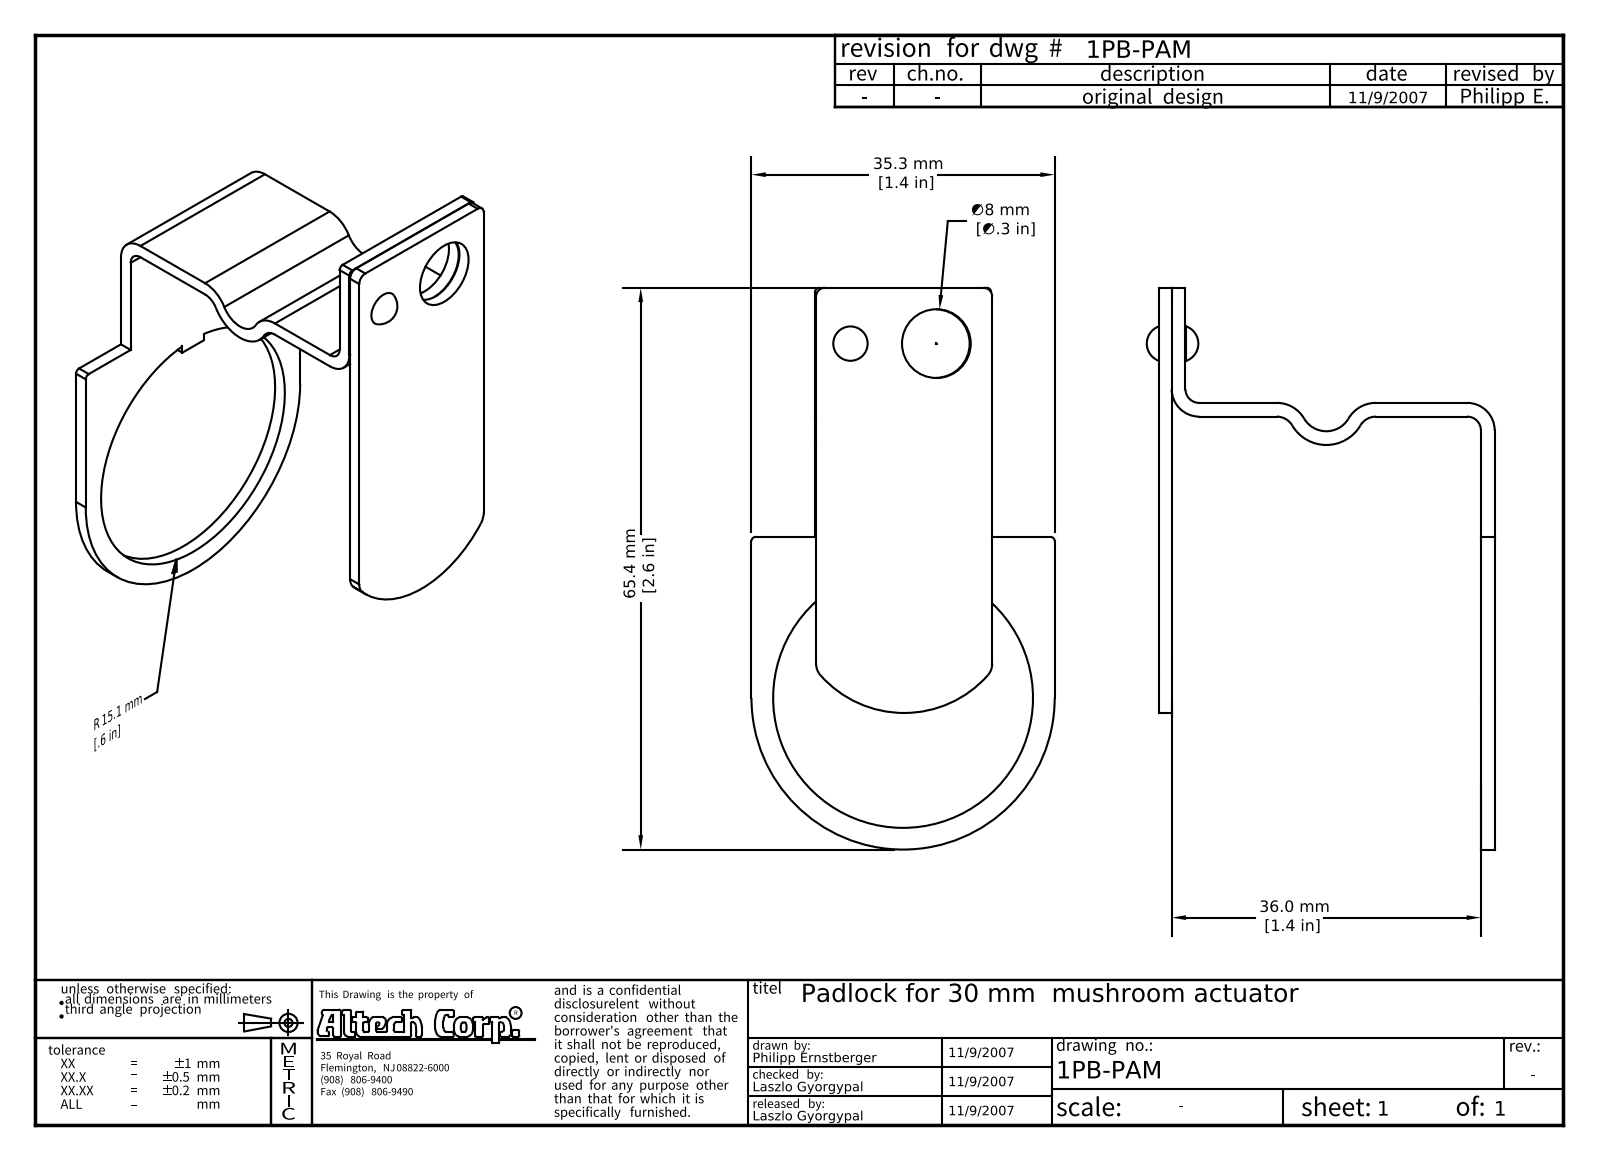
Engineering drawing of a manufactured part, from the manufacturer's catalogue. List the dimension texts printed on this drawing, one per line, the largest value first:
65.4 mm [2.6 in]
36.0 mm [1.4 in]
35.3 mm [1.4 in]
∅8 mm [∅.3 in]
